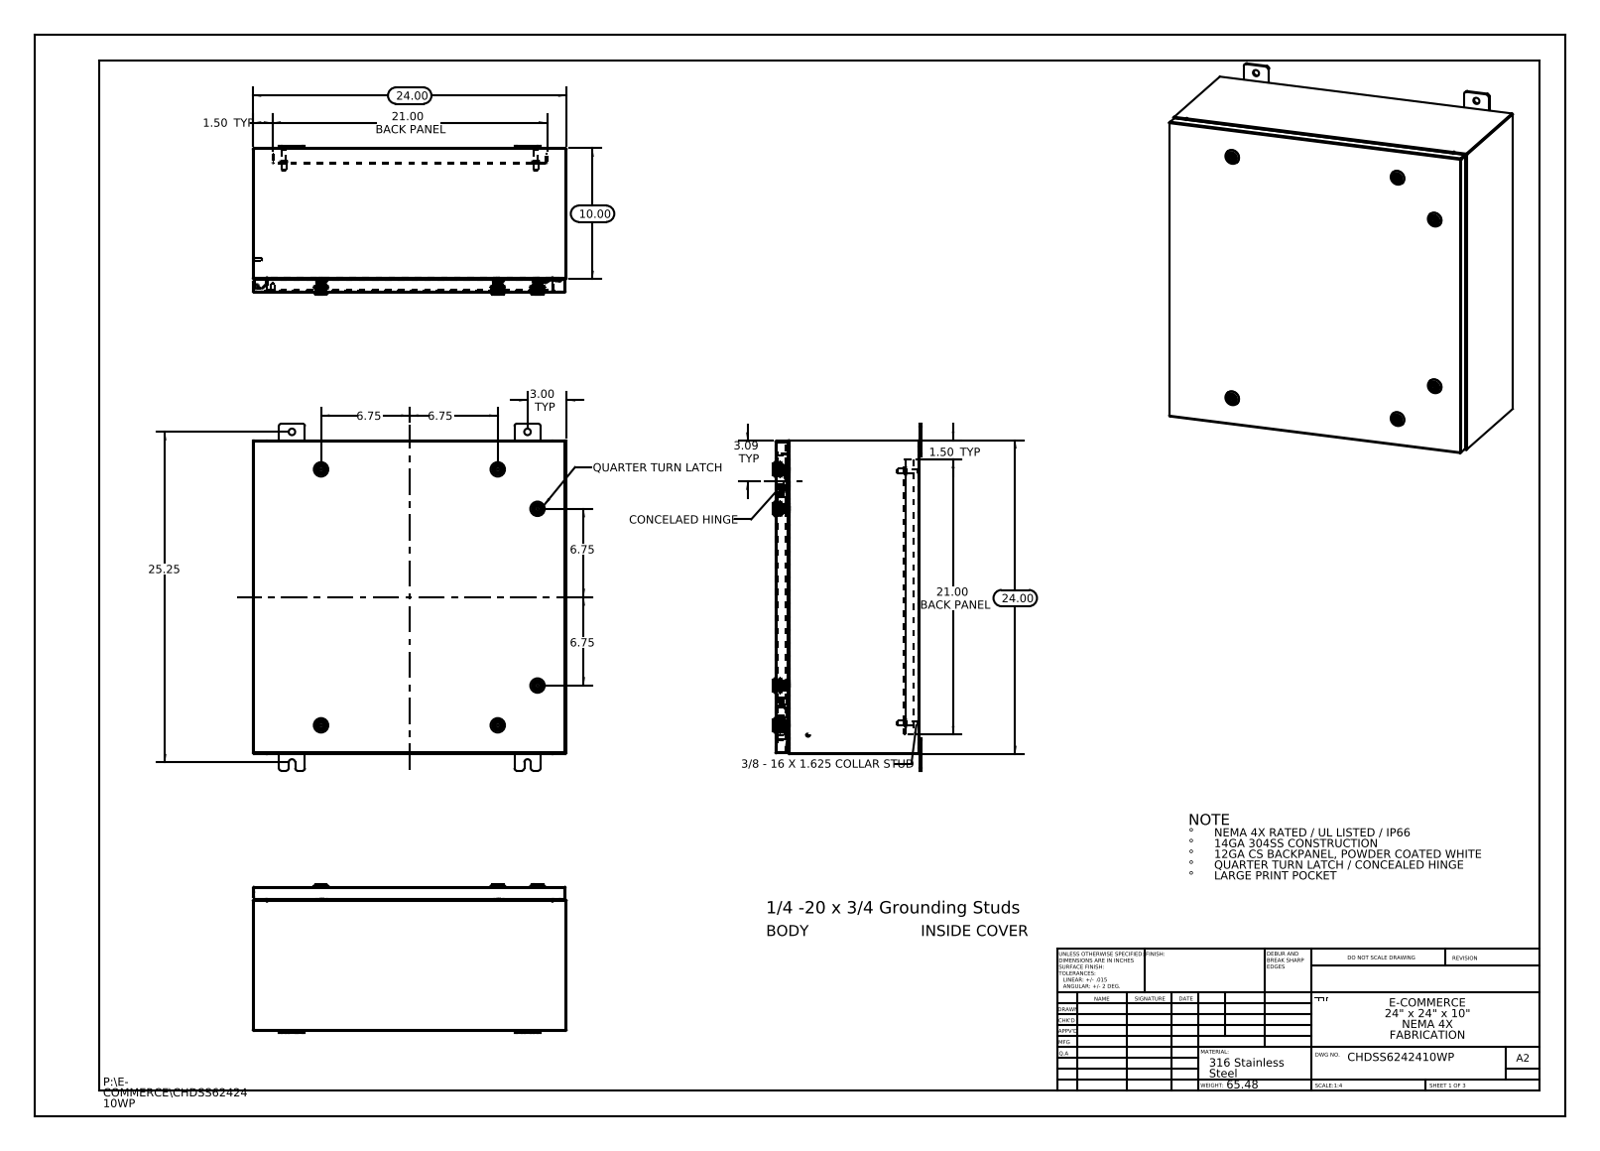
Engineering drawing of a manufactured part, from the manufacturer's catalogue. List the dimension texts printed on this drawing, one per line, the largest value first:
25.25
24.00
24.00
21.00 BACK PANEL
21.00 BACK PANEL
10.00
6.75
6.75
6.75
6.75
3.09 TYP
3.00 TYP
1.50 TYP
1.50 TYP
